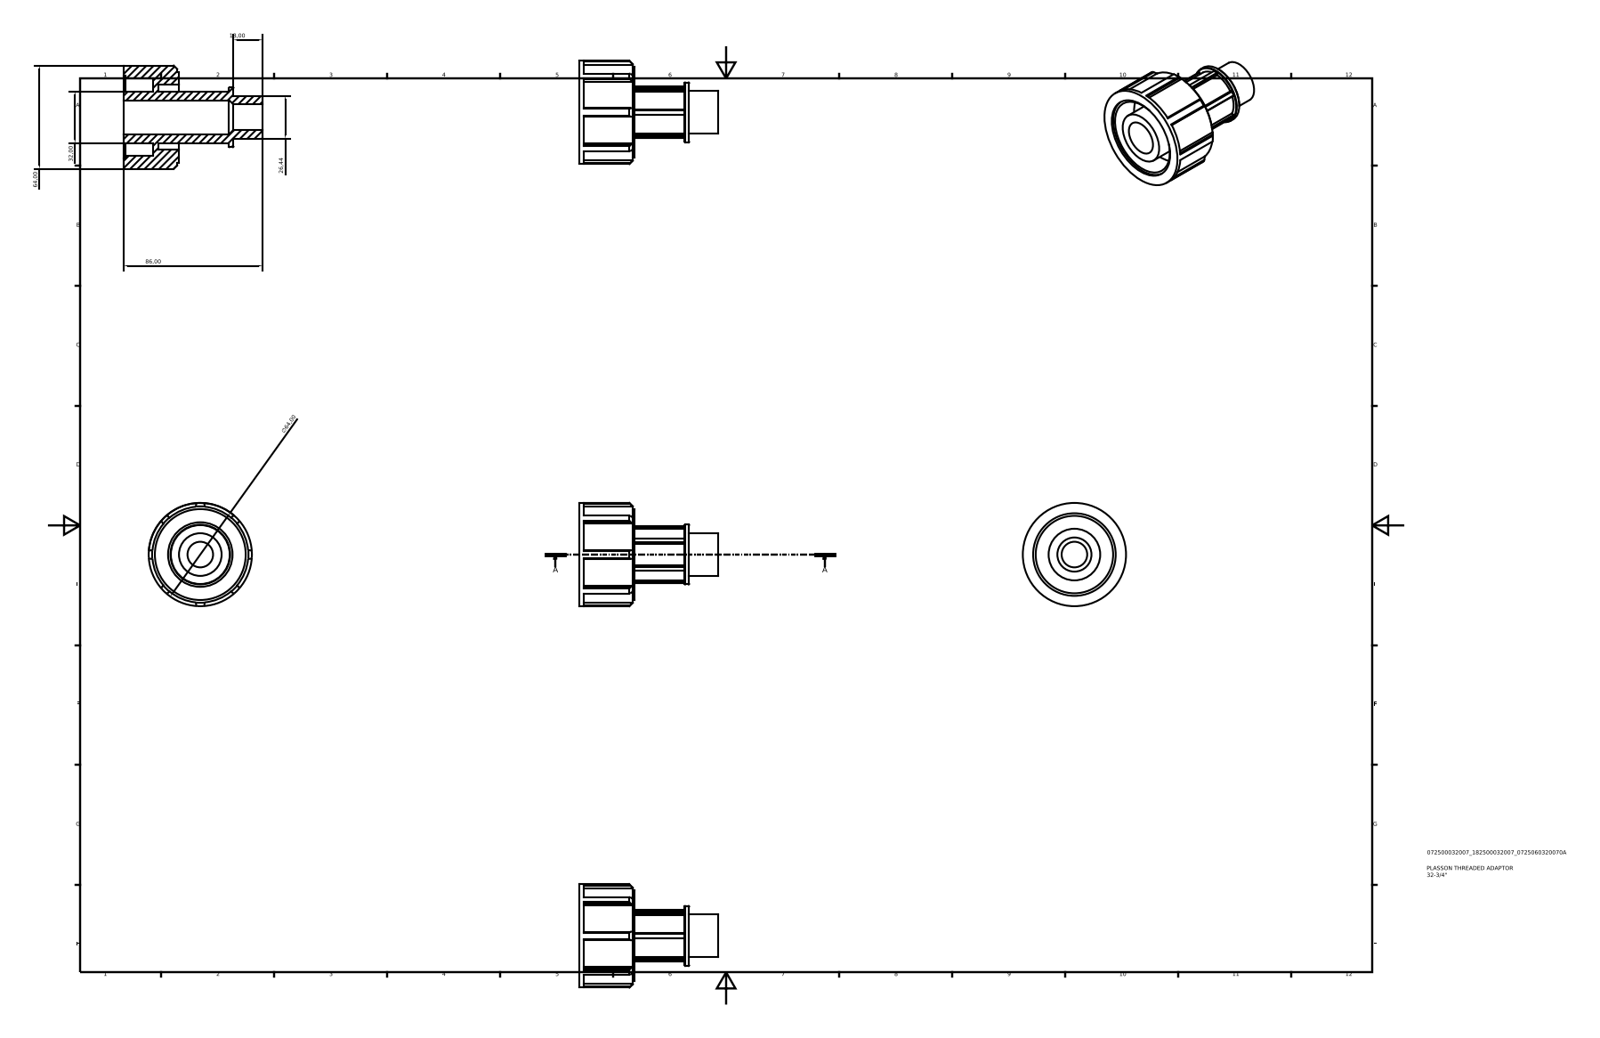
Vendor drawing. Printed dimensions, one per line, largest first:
86,00
64,00
∅64,00
32,00
26,44
18,00
